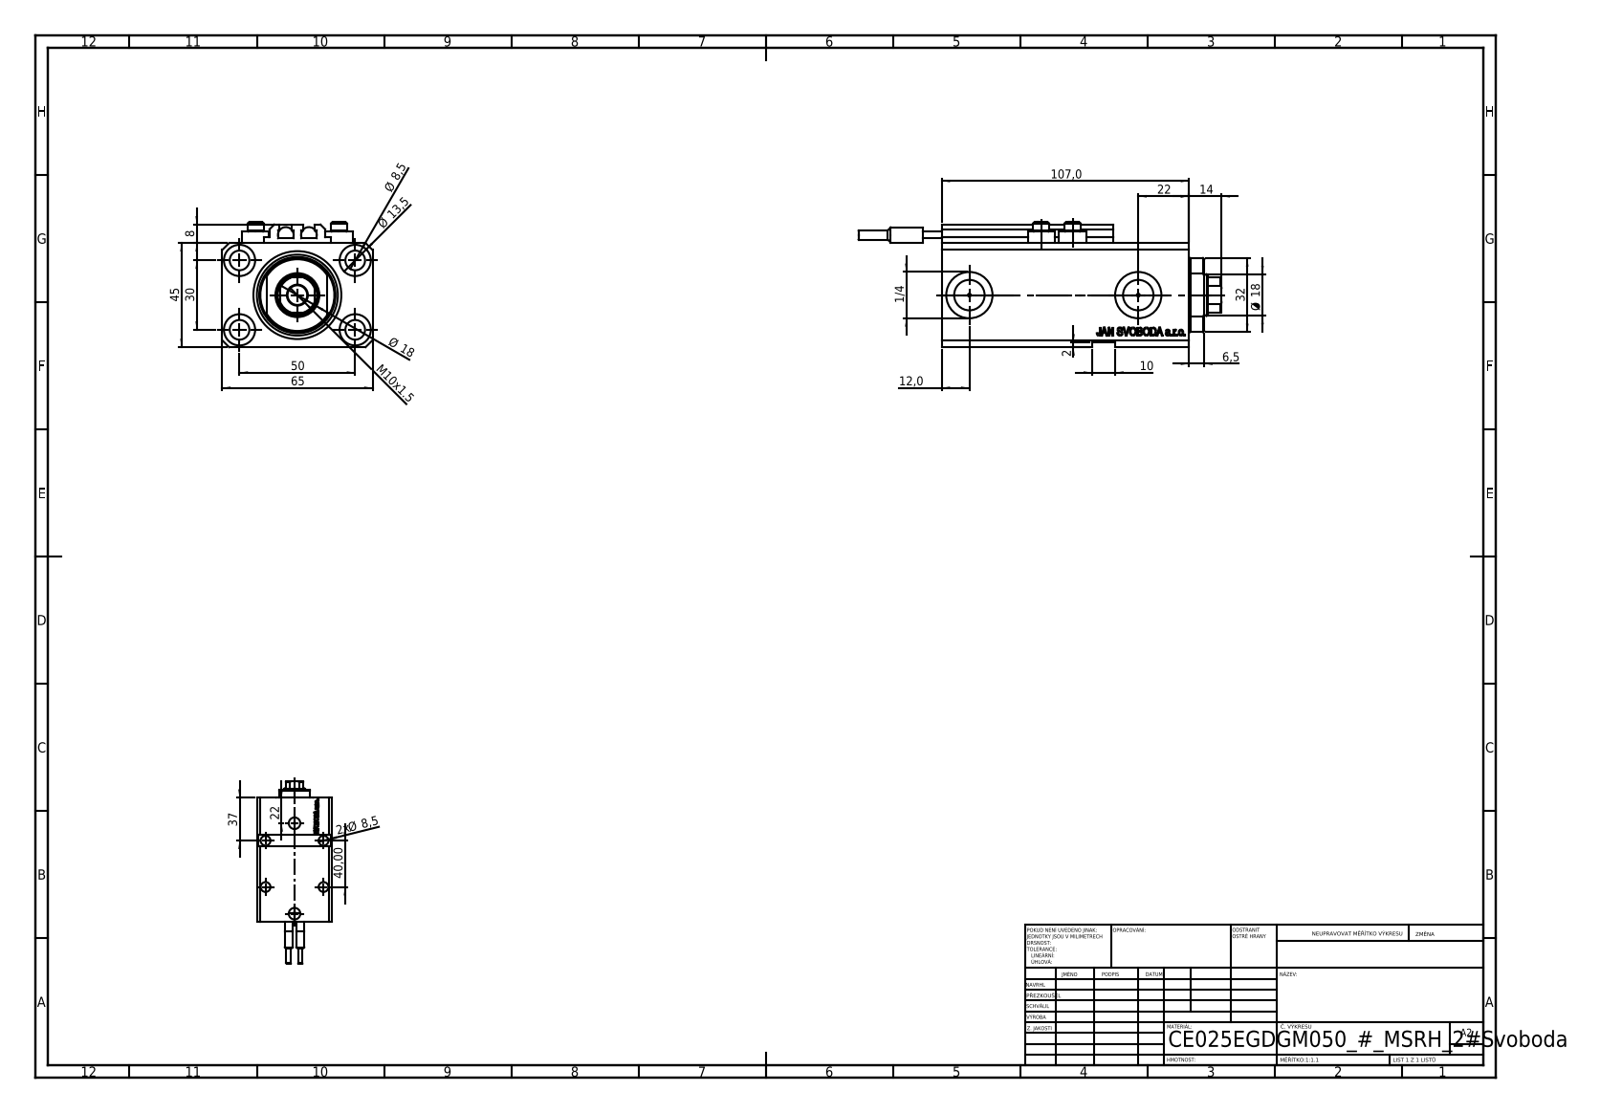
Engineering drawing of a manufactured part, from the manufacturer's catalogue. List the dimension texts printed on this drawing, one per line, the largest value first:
107,0
65
50
45
40,00
37
32
30
22
22
Ø 18
Ø 18
14
Ø 13,5
12,0
M10x1.5
10
Ø 8,5
2x Ø 8,5
8
6,5
2
1/4
